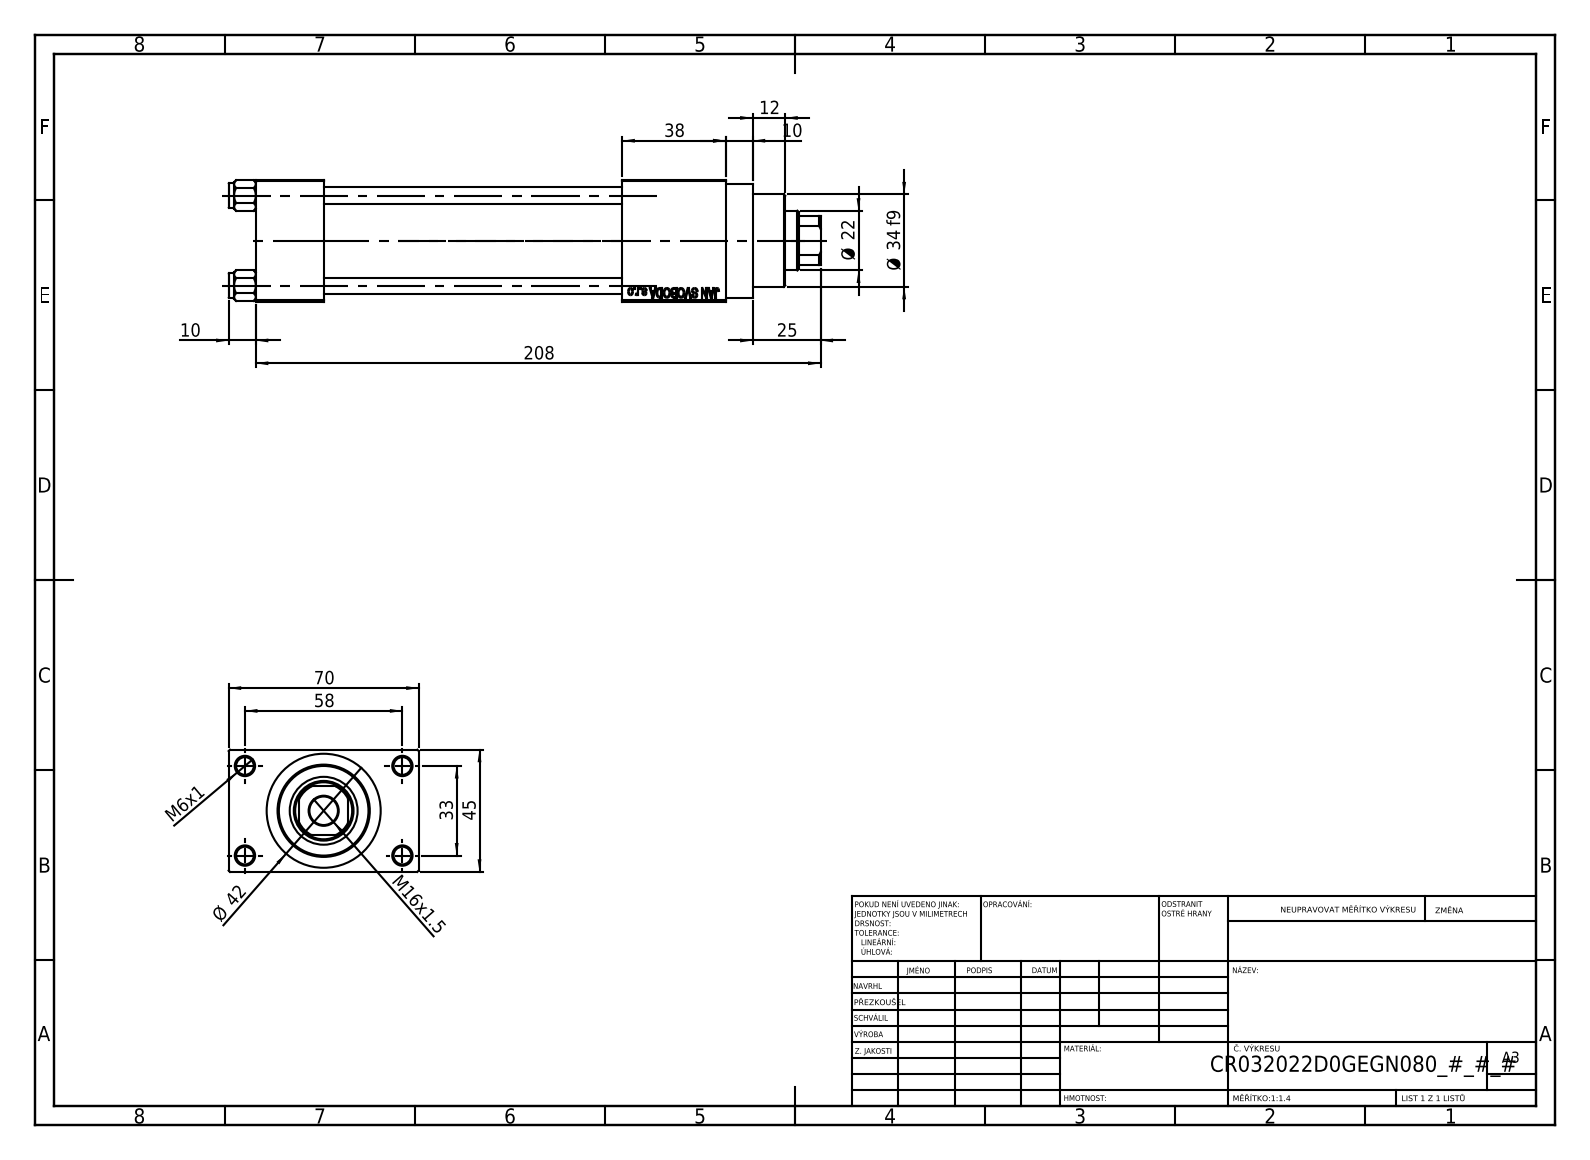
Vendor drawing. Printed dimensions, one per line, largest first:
208
70
58
45
Ø 42
38
Ø 34 f9
33
25
Ø 22
M16x1.5
12
10
10
M6x1
